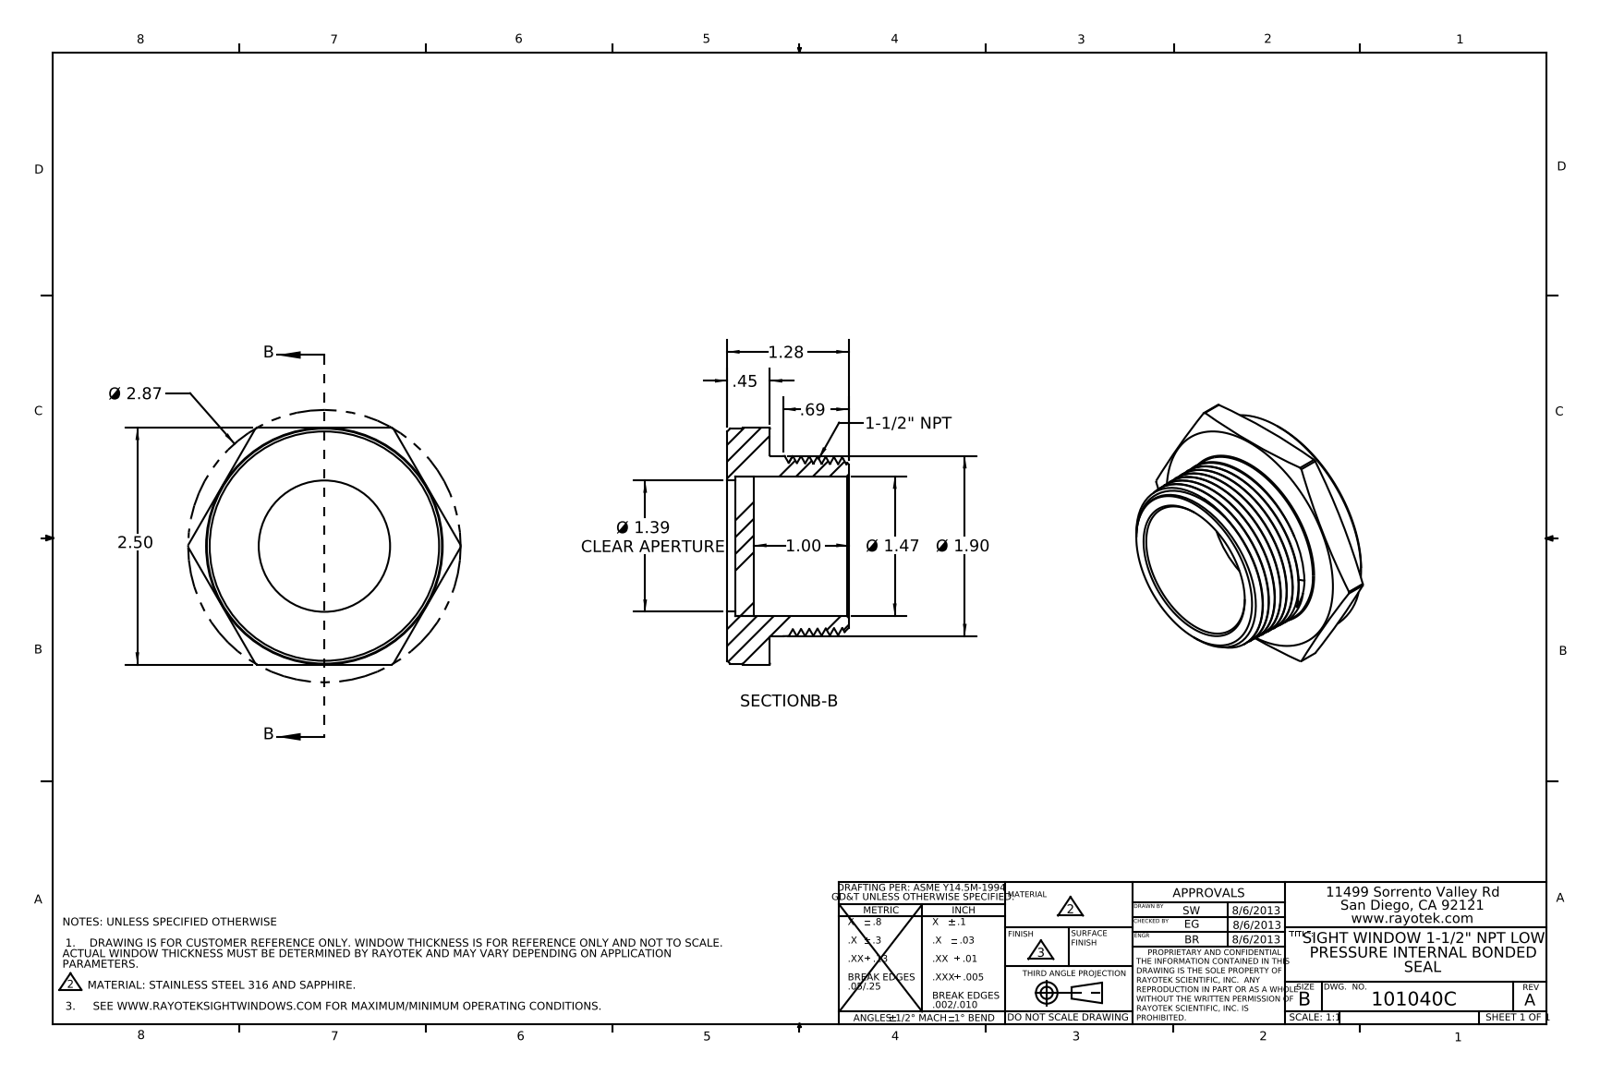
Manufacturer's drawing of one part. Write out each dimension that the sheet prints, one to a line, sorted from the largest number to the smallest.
Ø 2.87
2.50
Ø 1.90
Ø 1.47
Ø 1.39 CLEAR APERTURE
1.28
1.00
.69
.45
